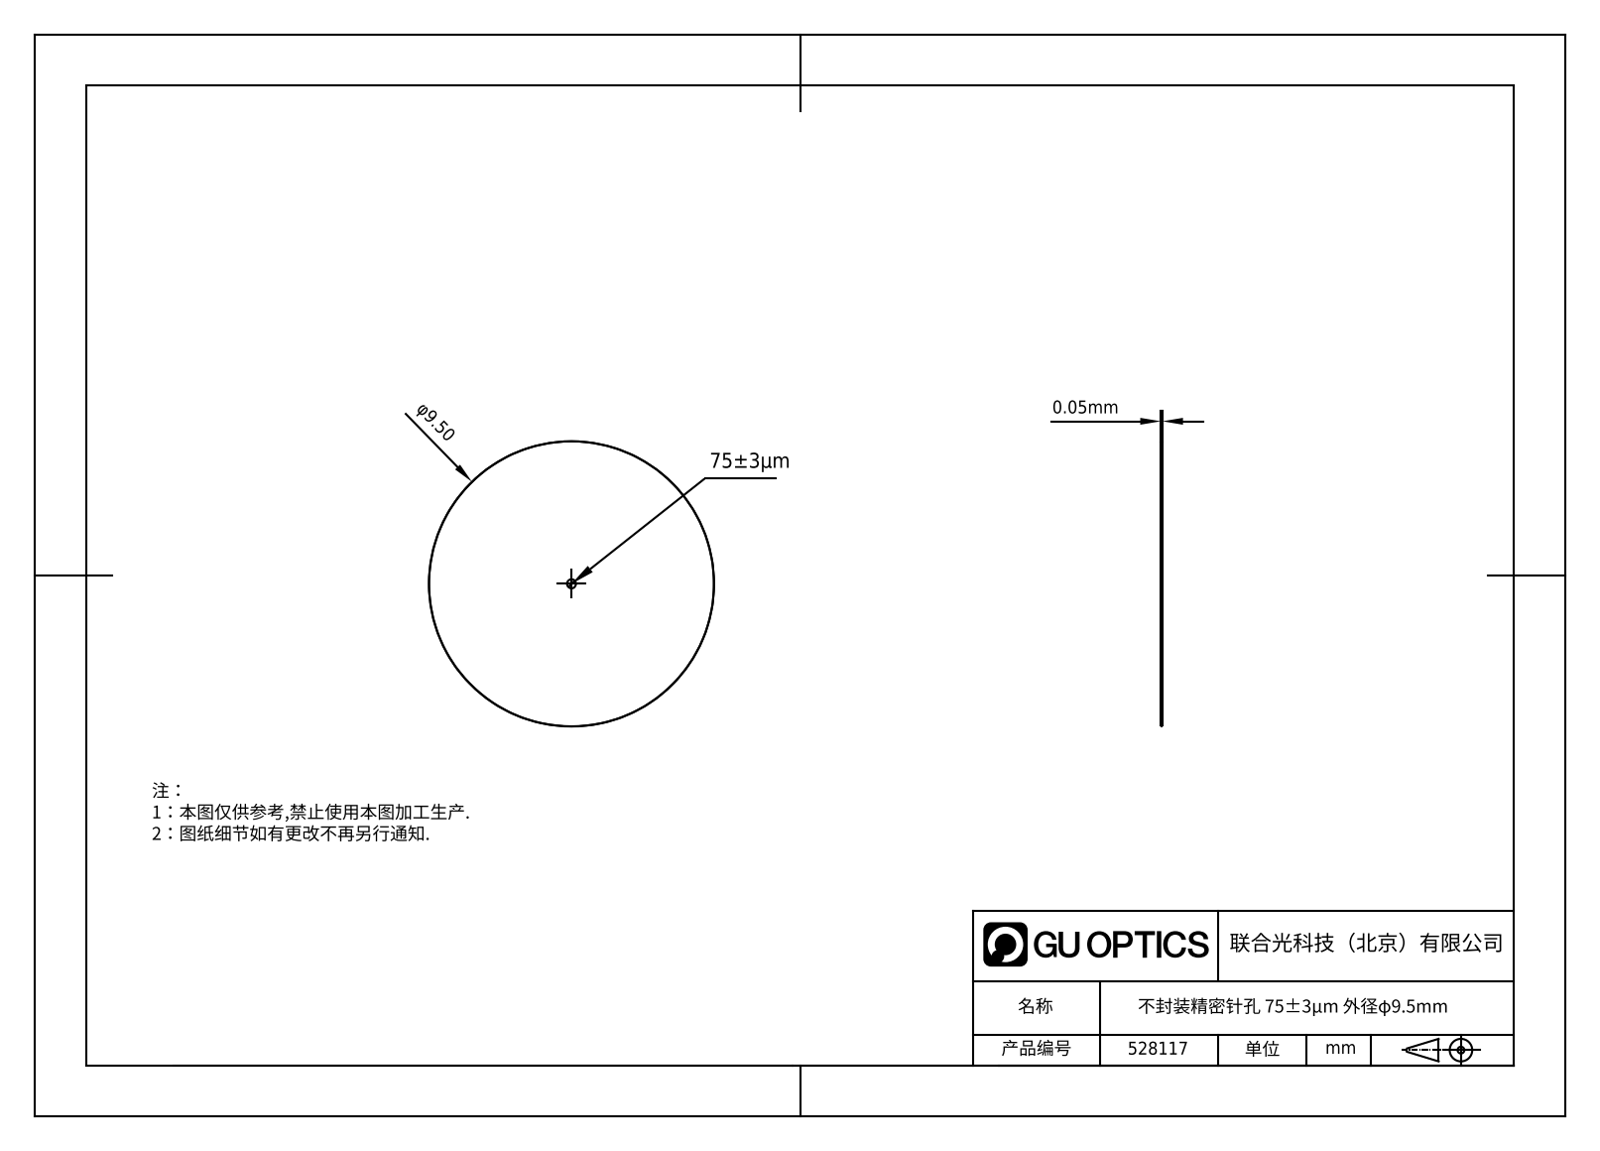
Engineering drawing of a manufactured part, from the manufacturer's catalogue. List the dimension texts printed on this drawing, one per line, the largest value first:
φ9.50
0.05mm
